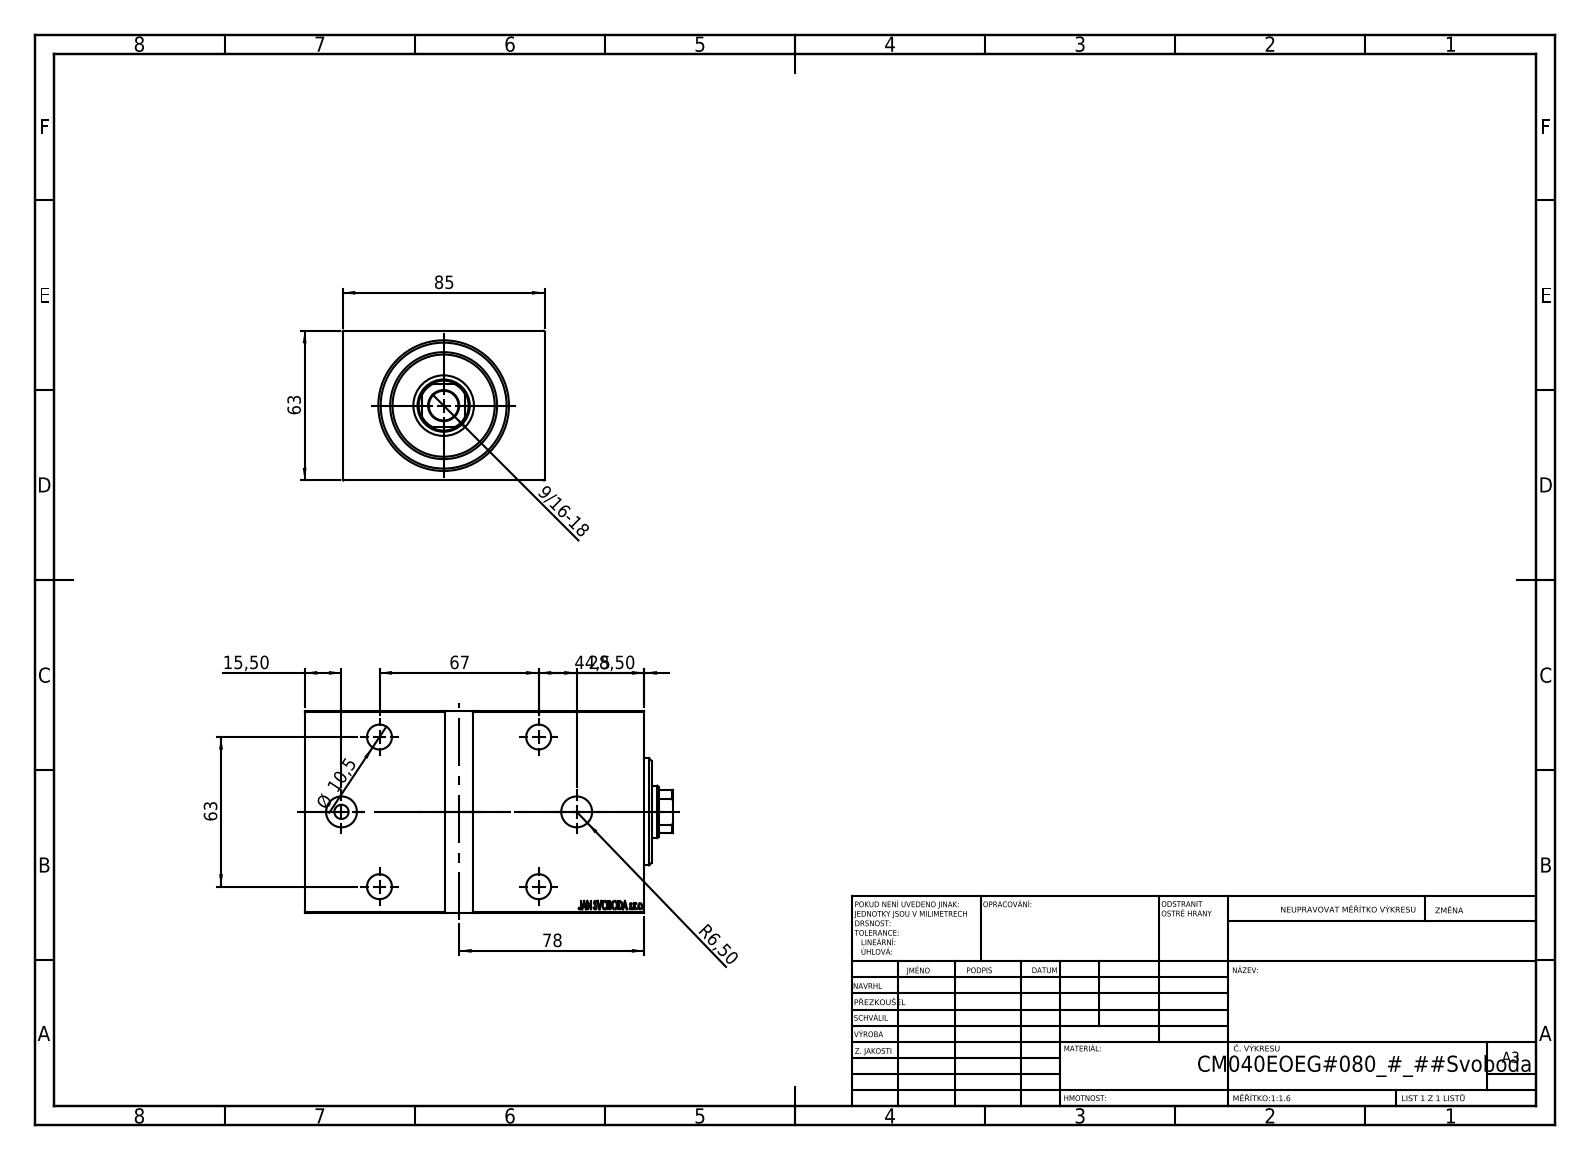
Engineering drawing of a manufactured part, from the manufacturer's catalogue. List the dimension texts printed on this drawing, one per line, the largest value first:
85
78
67
63
63
44,5
28,50
15,50
Ø 10,5
R6,50
9/16-18
